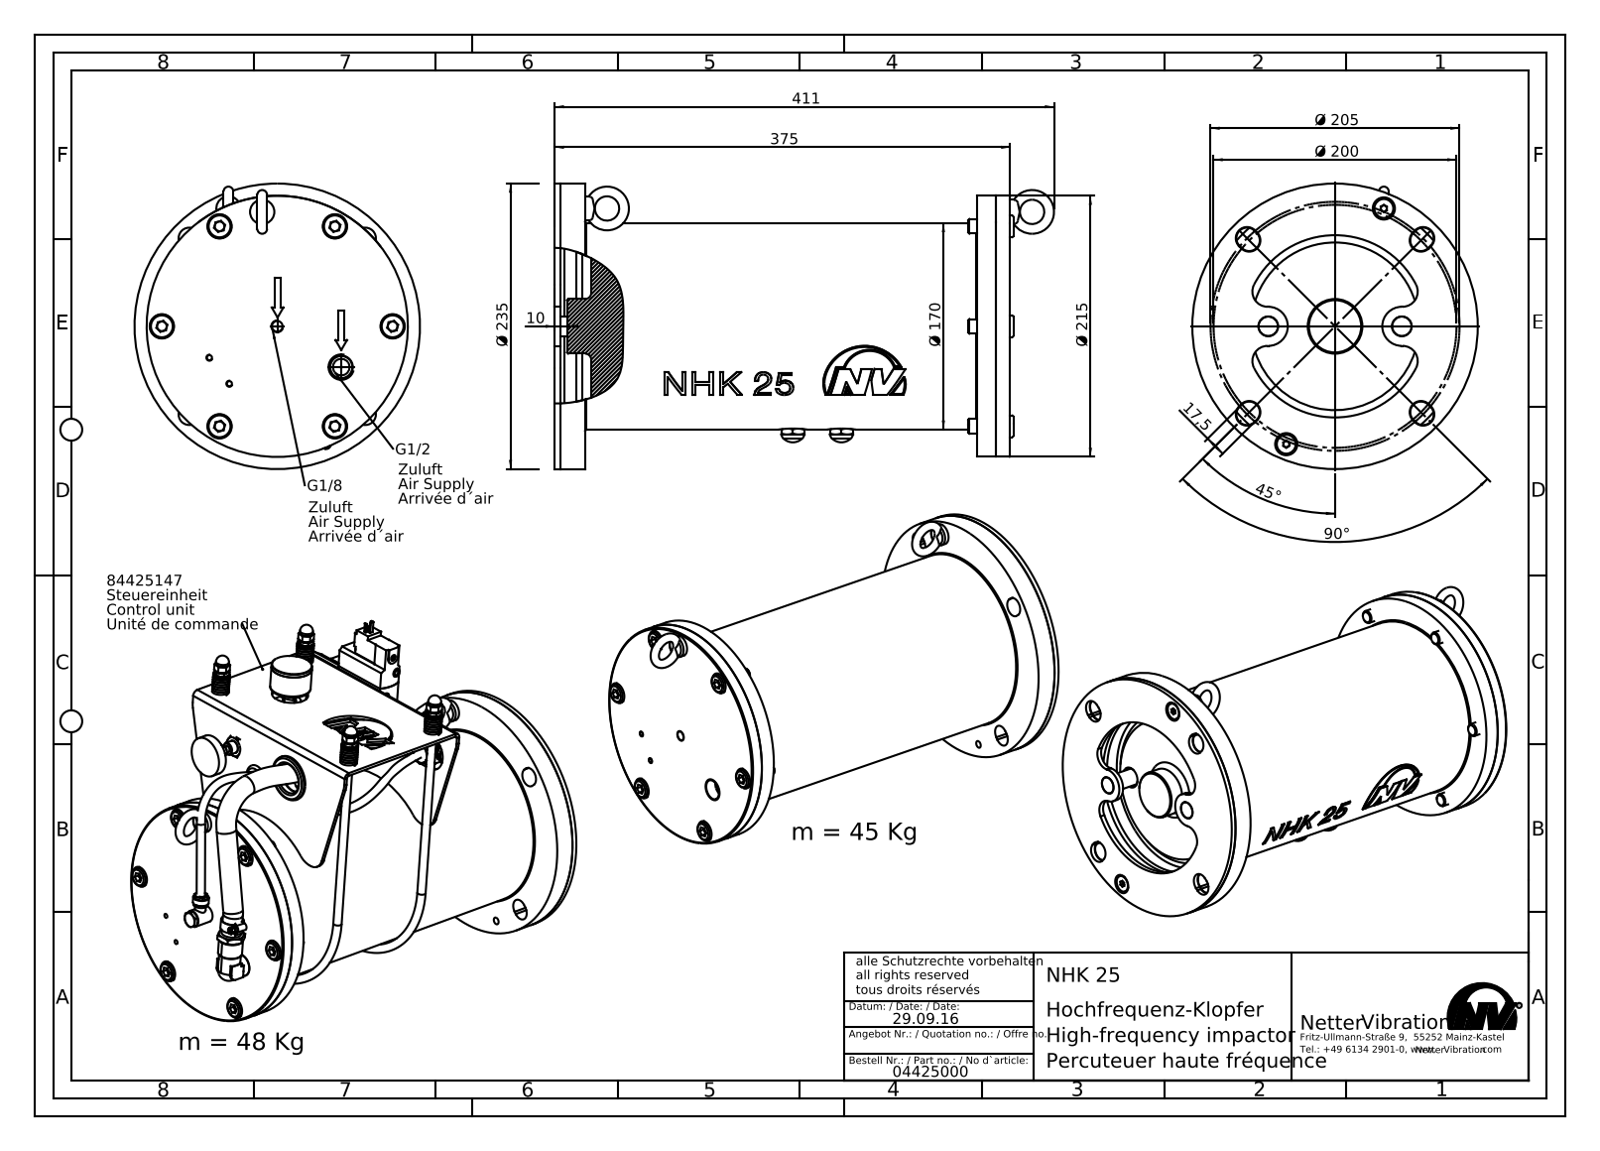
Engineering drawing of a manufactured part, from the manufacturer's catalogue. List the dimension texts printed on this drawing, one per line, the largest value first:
411
375
Ø 235
Ø 215
Ø 205
Ø 200
Ø 170
90°
45°
17,5
10
